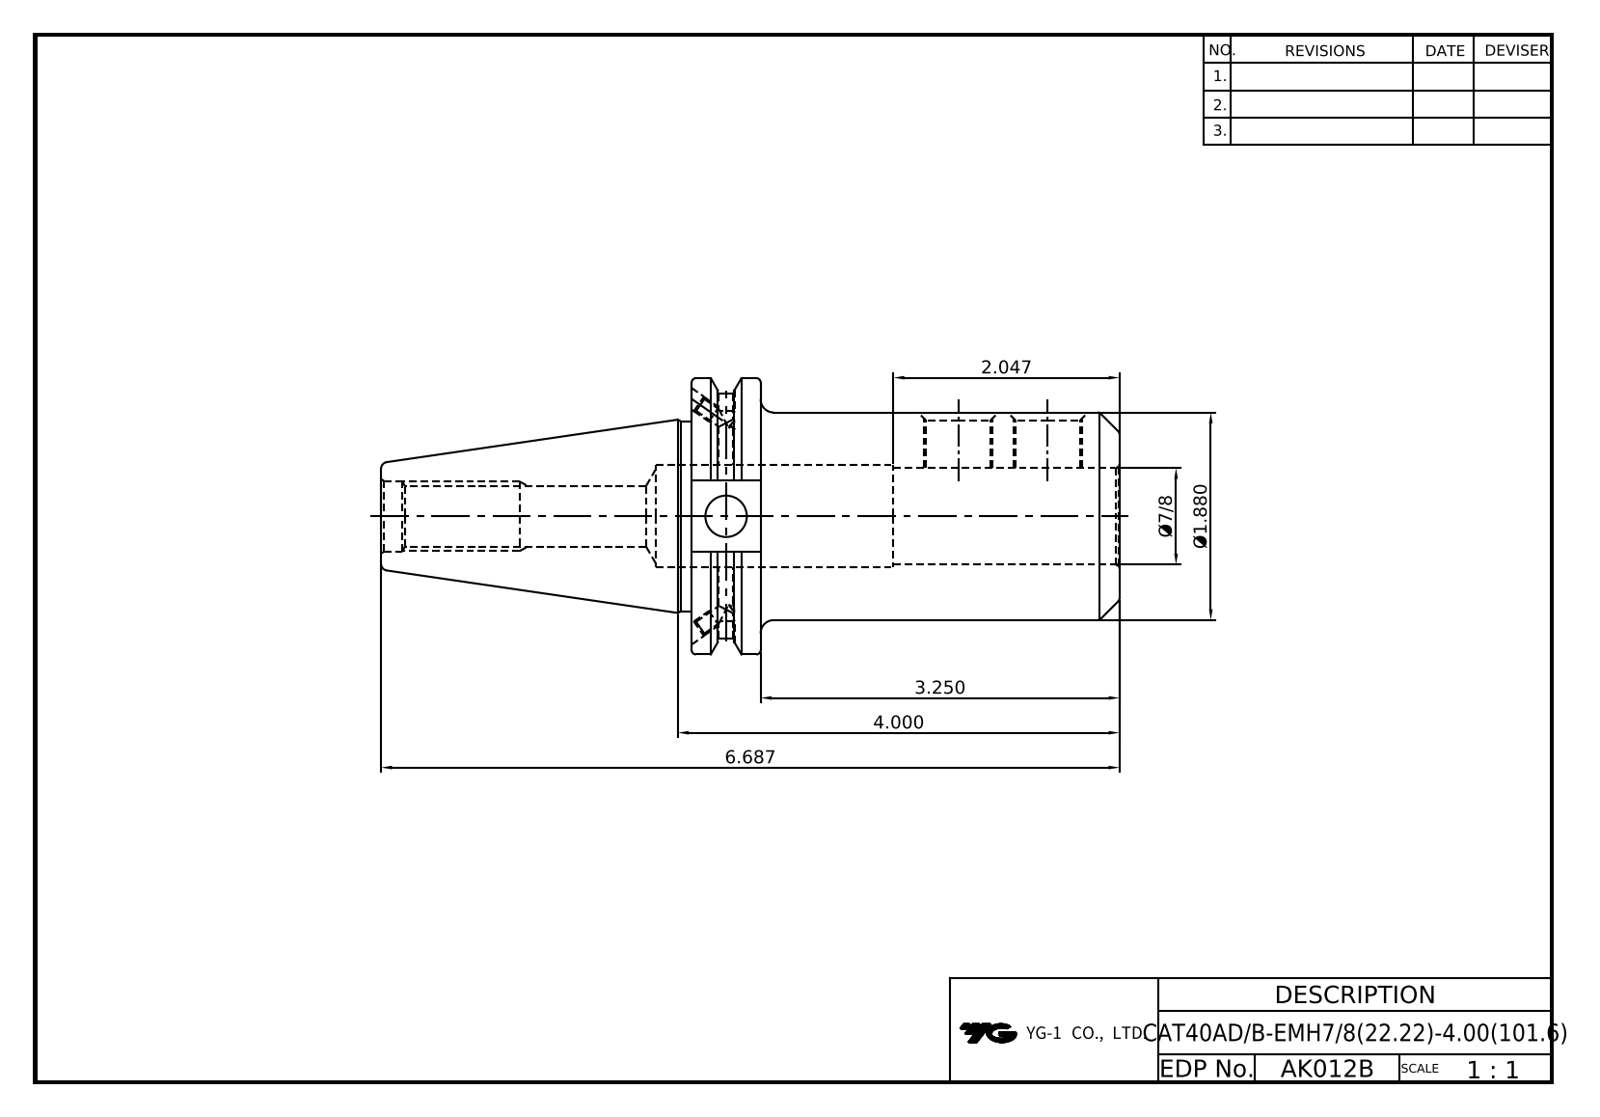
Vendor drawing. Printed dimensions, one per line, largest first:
6.687
4.000
3.250
2.047
Ø1.880
Ø7/8
